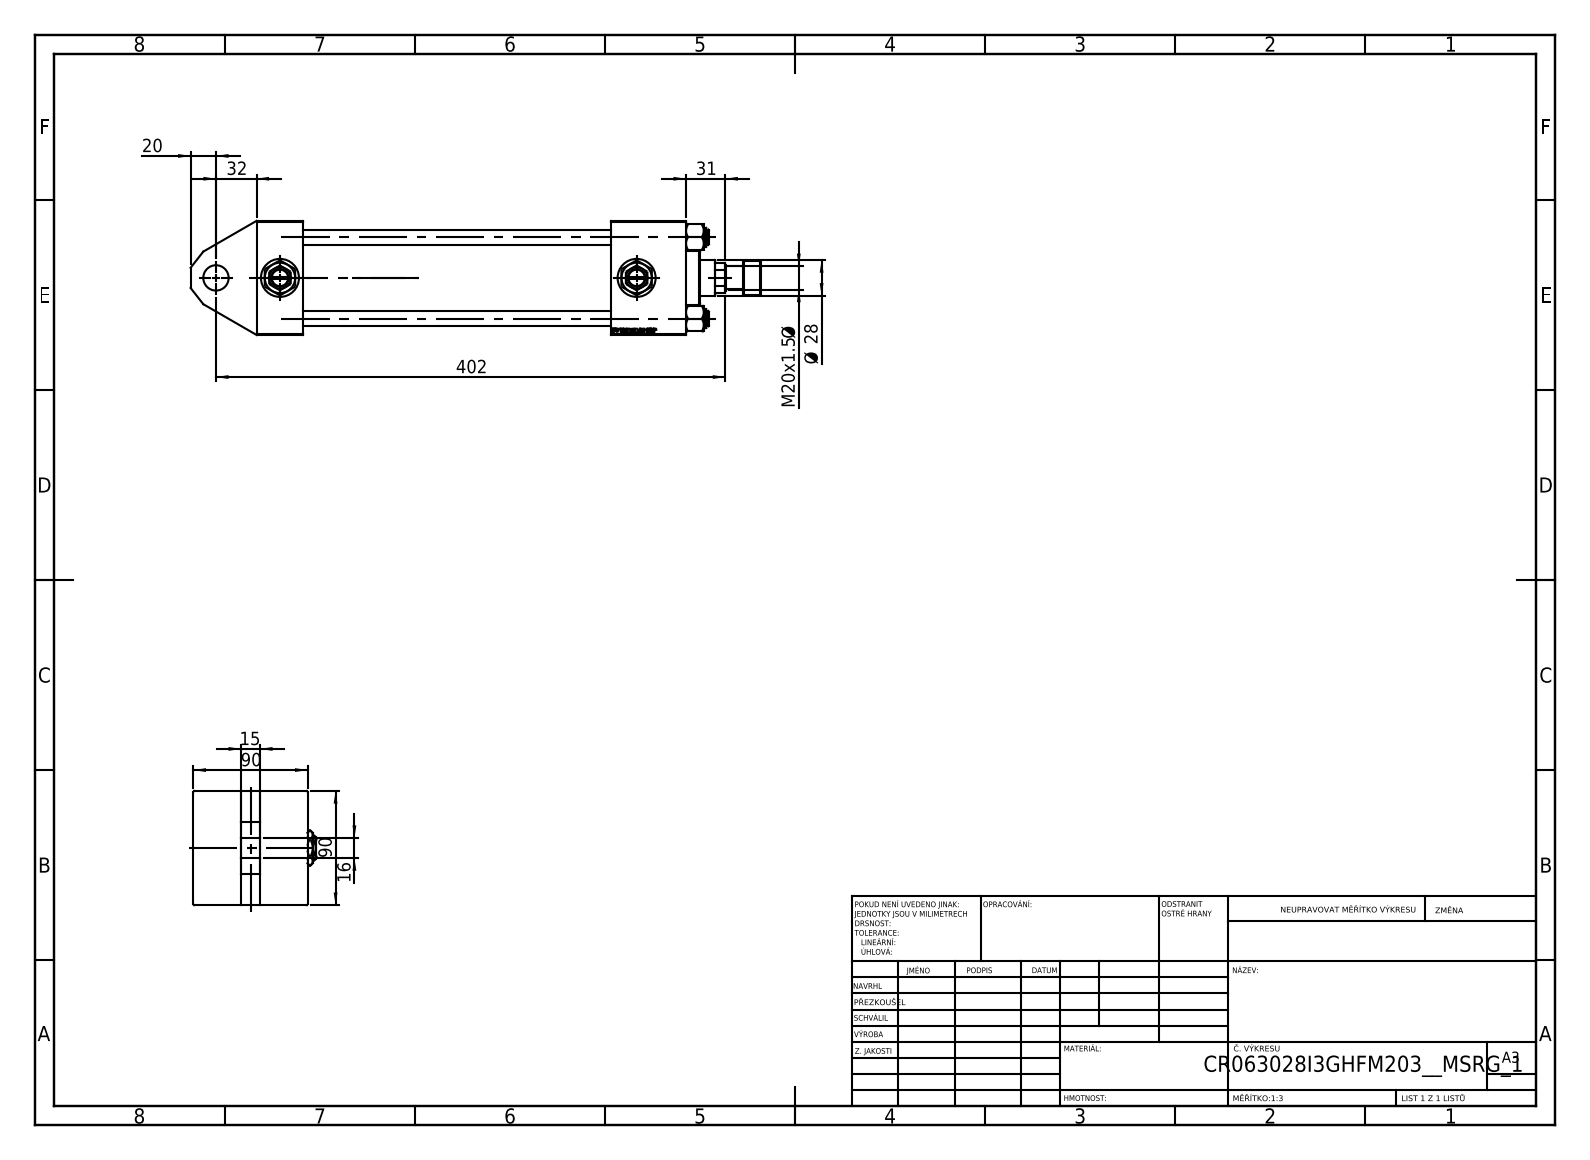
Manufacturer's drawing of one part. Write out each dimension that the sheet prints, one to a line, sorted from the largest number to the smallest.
402
90
90
32
31
Ø 28
M20x1.5 Ø
20
16
15
